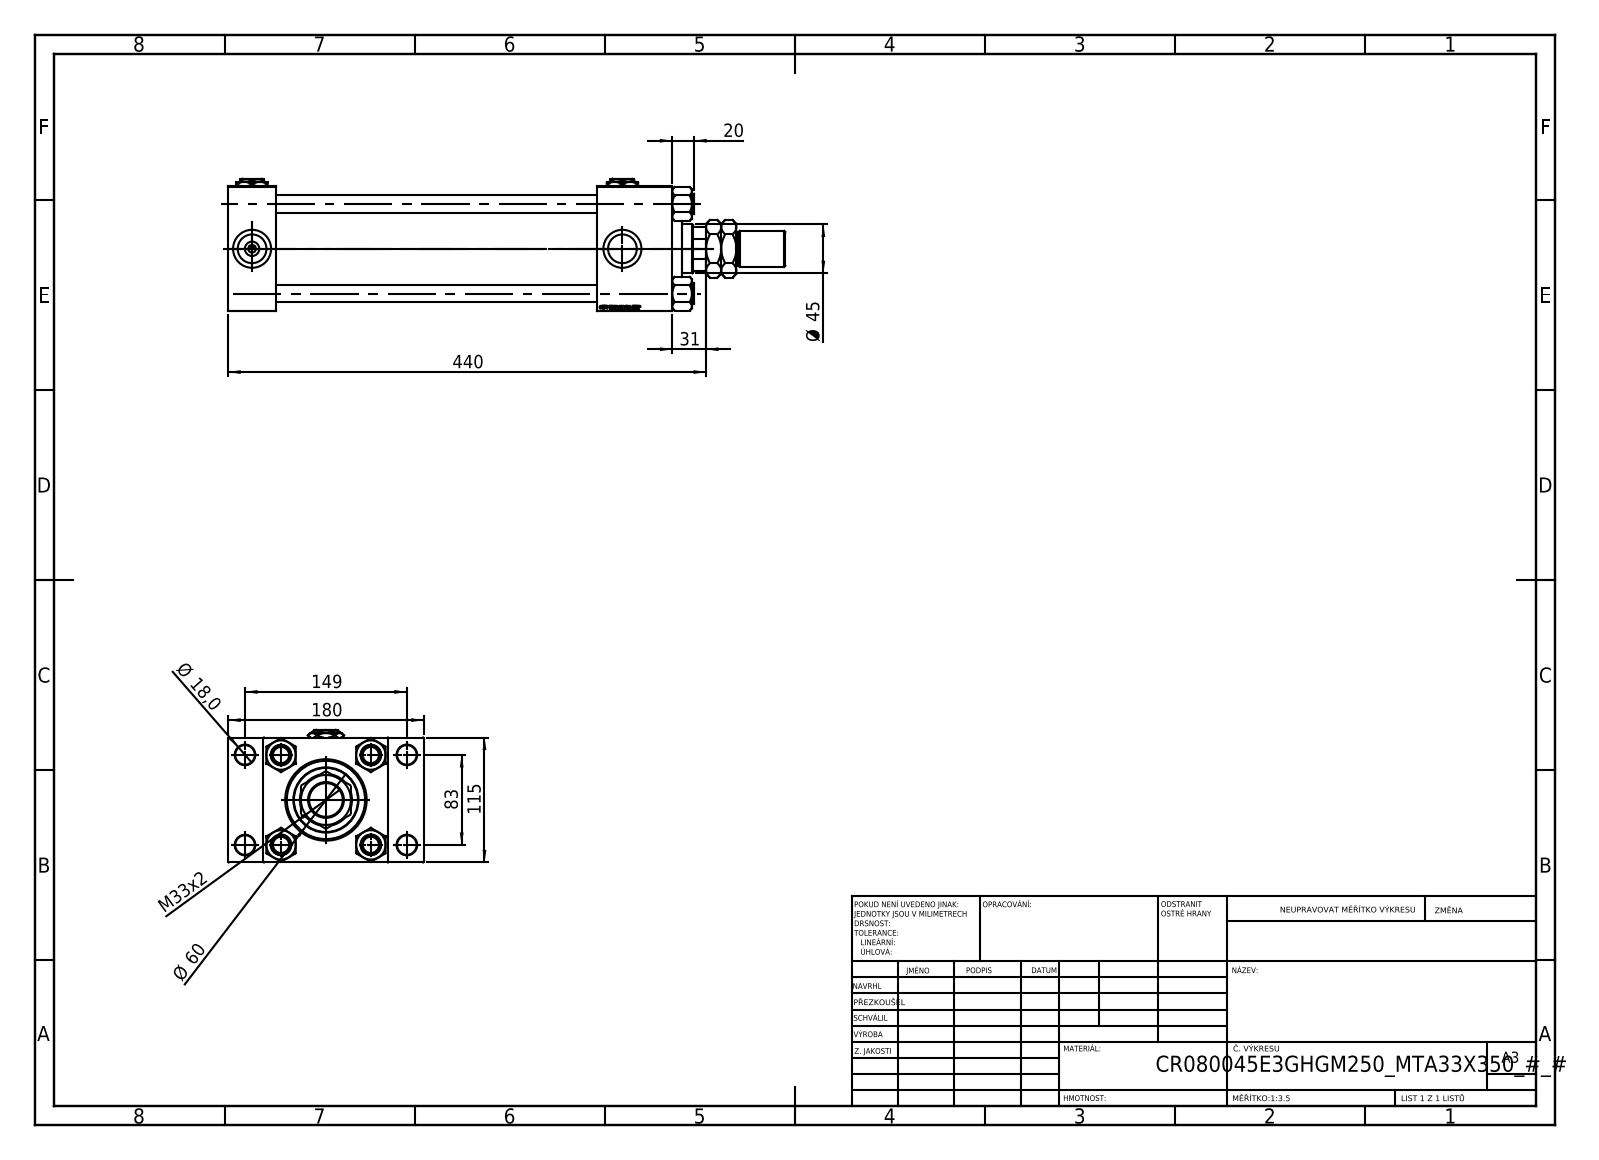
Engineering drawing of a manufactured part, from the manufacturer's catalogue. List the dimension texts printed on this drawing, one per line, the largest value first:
440
180
149
115
83
Ø 60
Ø 45
M33x2
31
20
Ø 18,0
